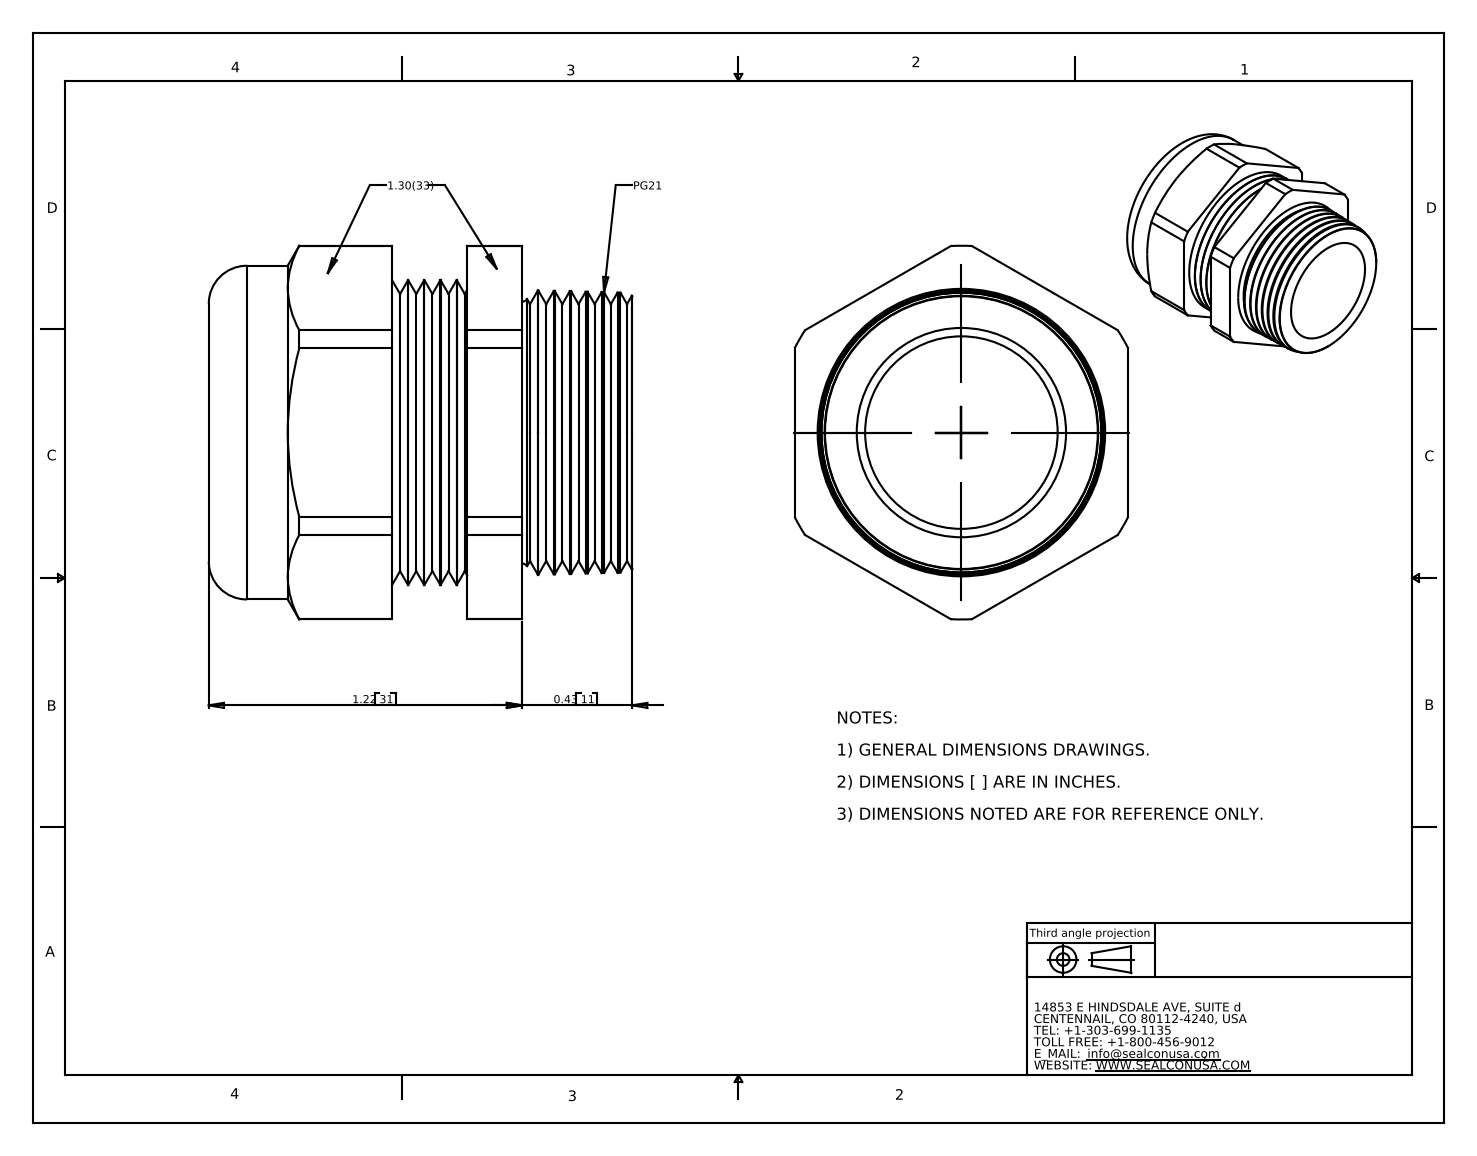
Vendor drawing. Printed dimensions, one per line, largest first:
1.22 31
0.43 11
